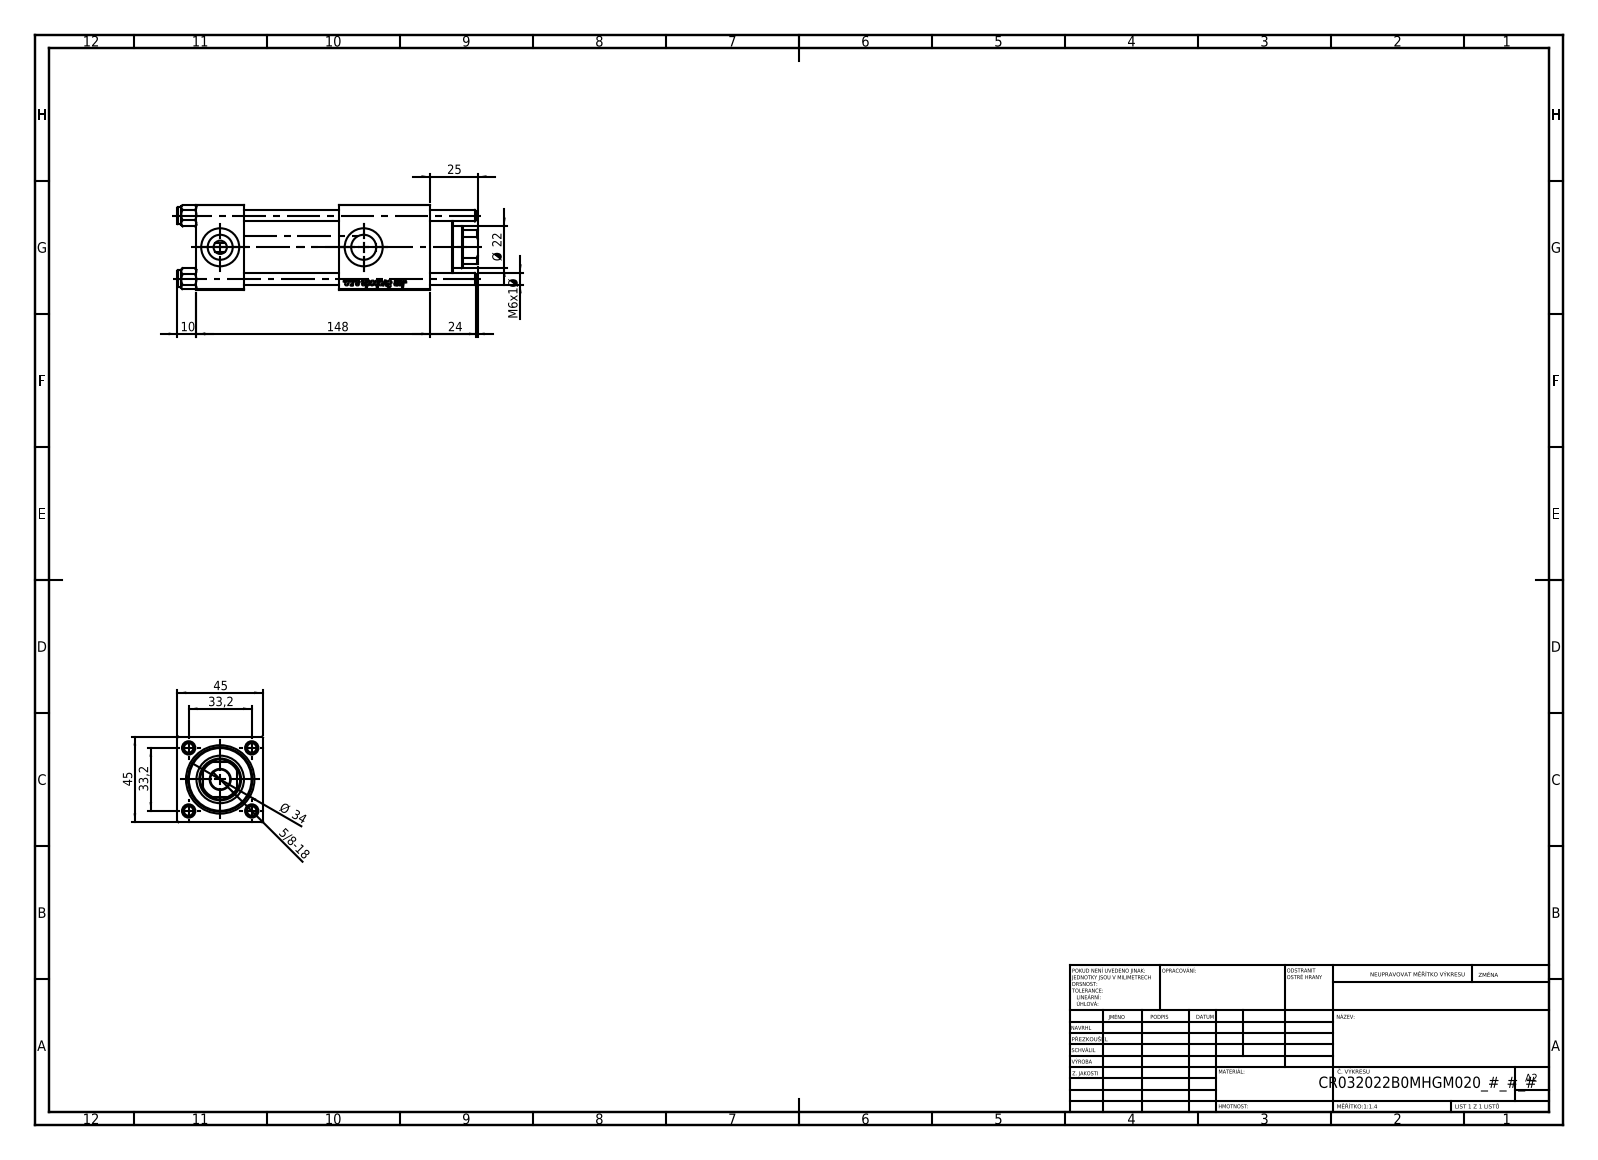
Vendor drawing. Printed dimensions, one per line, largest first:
148
45
45
Ø 34
33,2
33,2
25
24
Ø 22
10
M6x1 Ø
5/8-18
